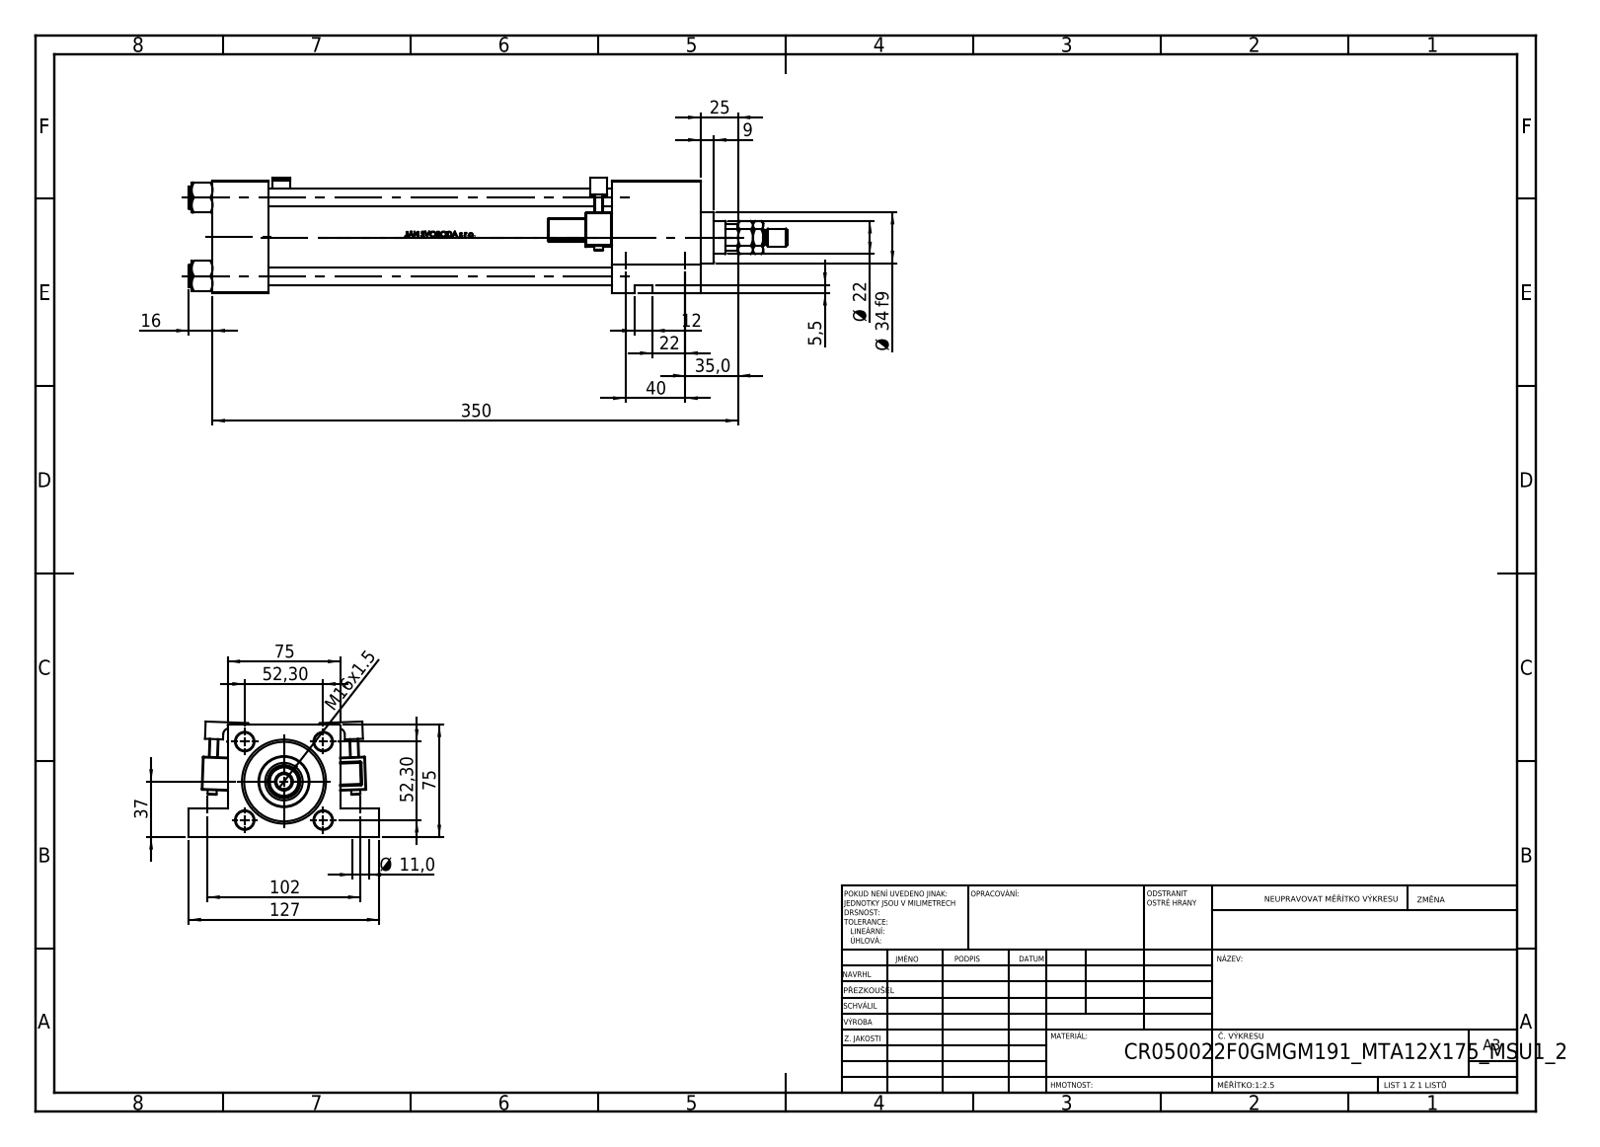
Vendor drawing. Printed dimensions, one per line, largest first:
350
127
102
75
75
52,30
52,30
40
37
35,0
Ø 34 f9
25
Ø 22
22
16
M16x1.5
12
Ø 11,0
9
5,5
